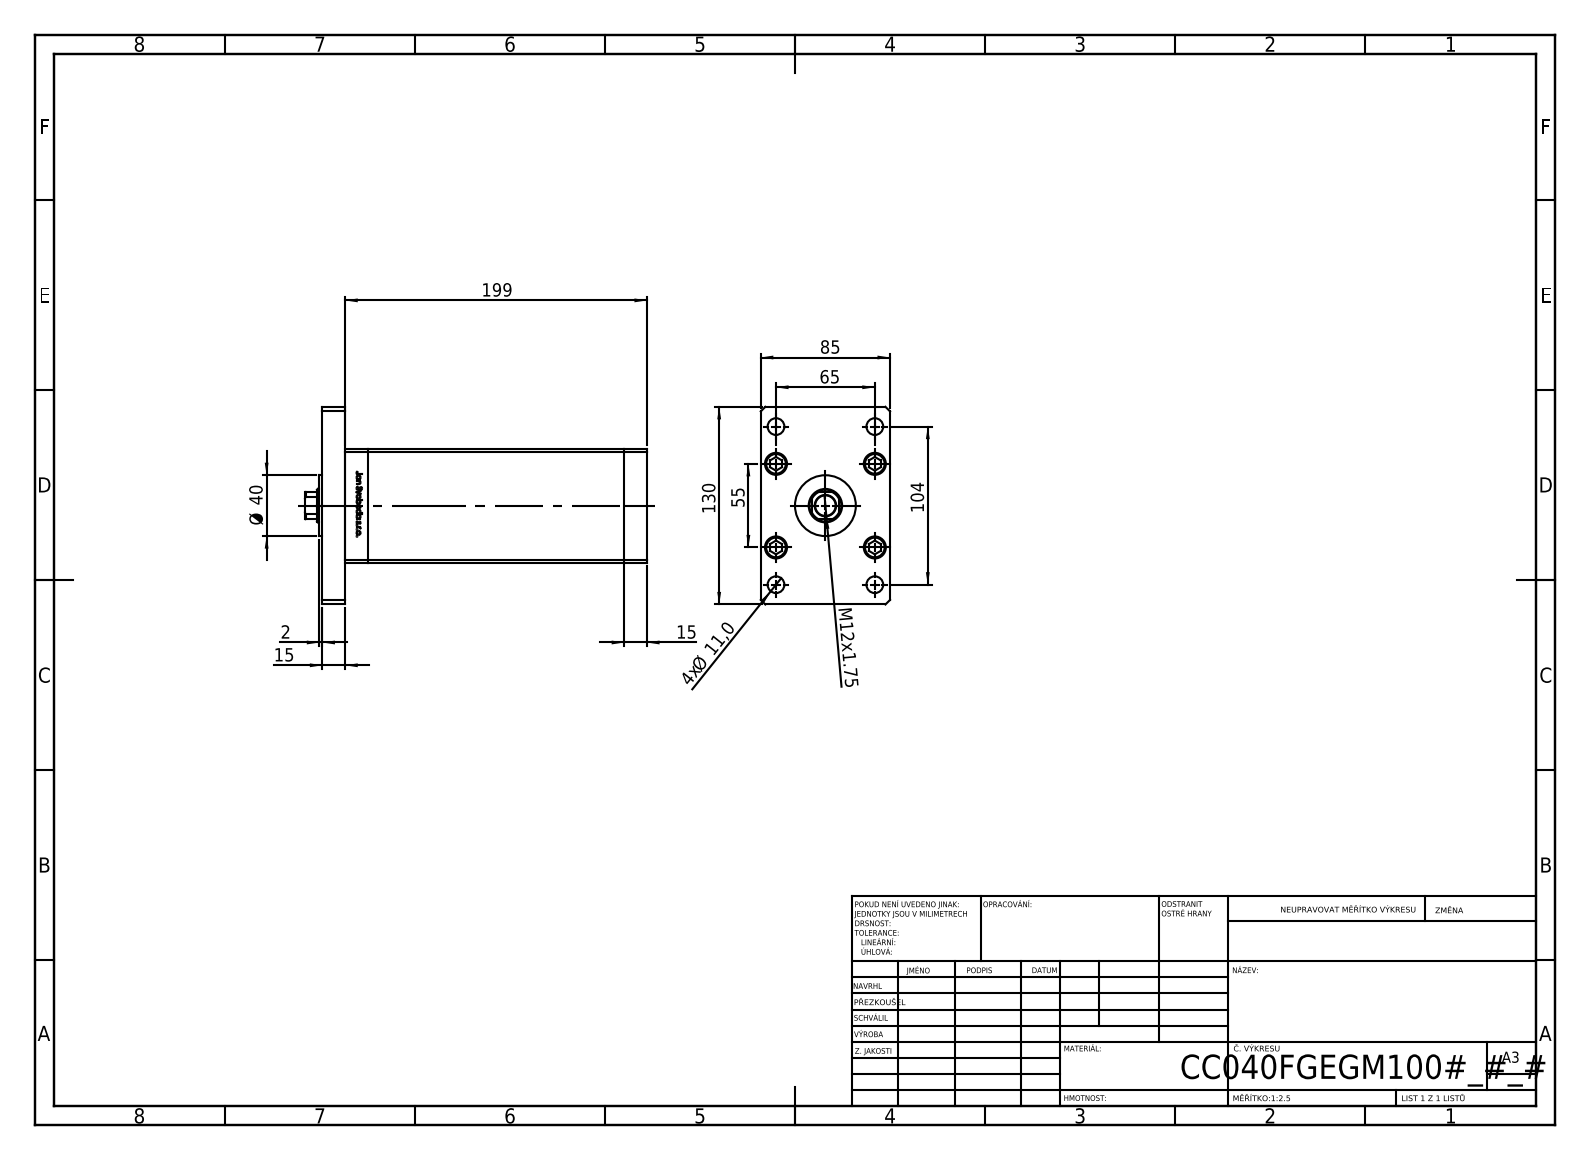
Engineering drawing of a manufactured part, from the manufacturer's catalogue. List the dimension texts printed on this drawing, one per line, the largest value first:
199
130
104
85
65
55
Ø 40
15
15
M12x1.75
4x Ø 11,0
2
